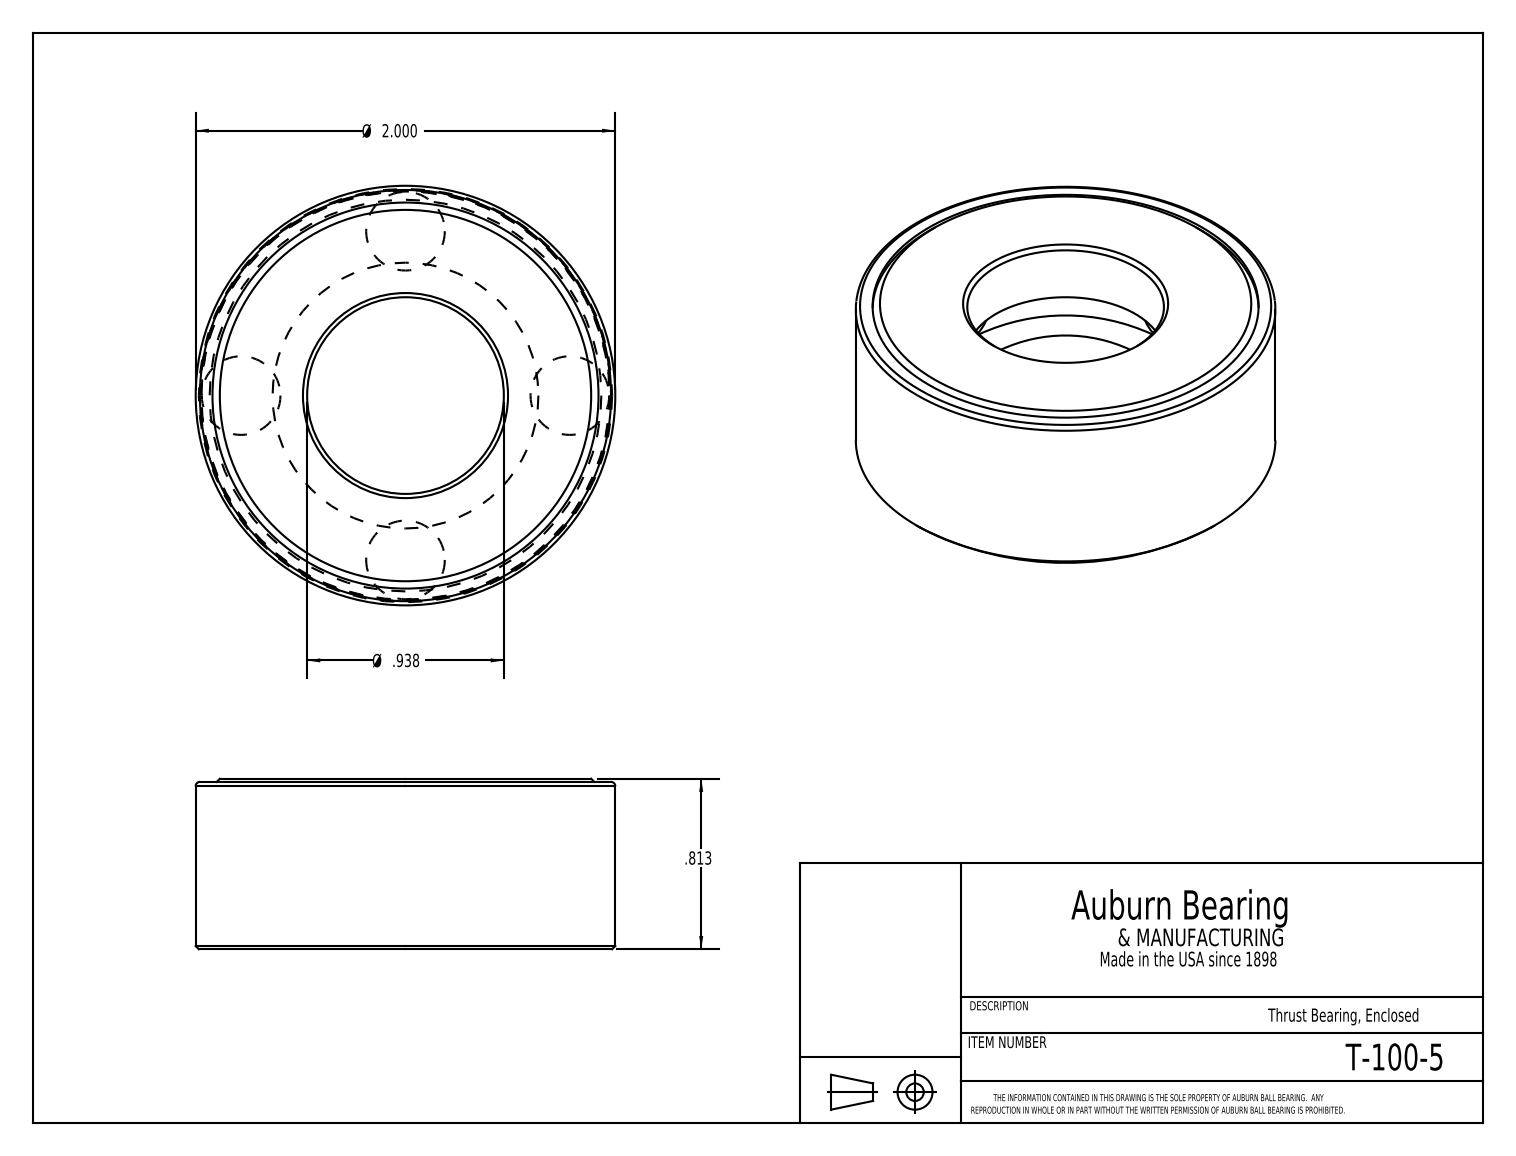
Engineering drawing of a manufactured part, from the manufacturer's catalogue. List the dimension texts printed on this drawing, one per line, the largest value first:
Ø 2.000
Ø .938
.813
